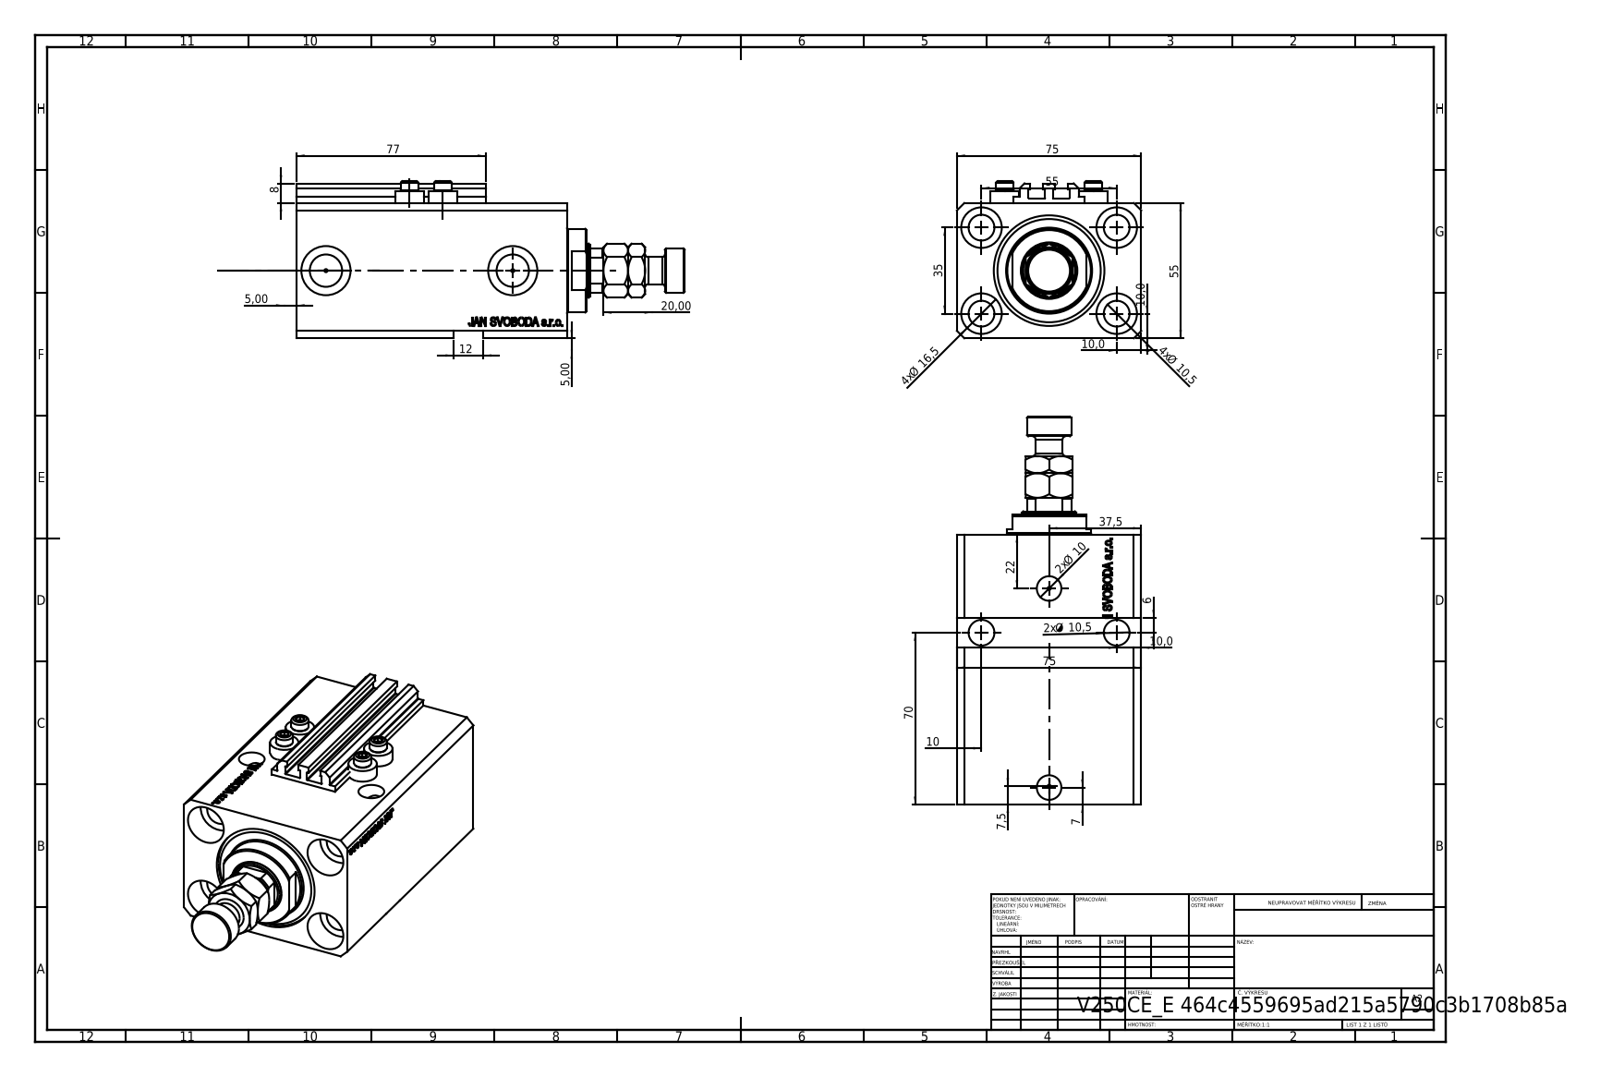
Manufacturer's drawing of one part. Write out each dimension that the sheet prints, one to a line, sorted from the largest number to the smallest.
77
75
75
70
55
55
37,5
35
22
20,00
4x Ø 16,5
12
4x Ø 10,5
2x Ø 10,5
10,0
10,0
2x Ø 10
10,0
10
8
7,5
7
6
5,00
5,00
